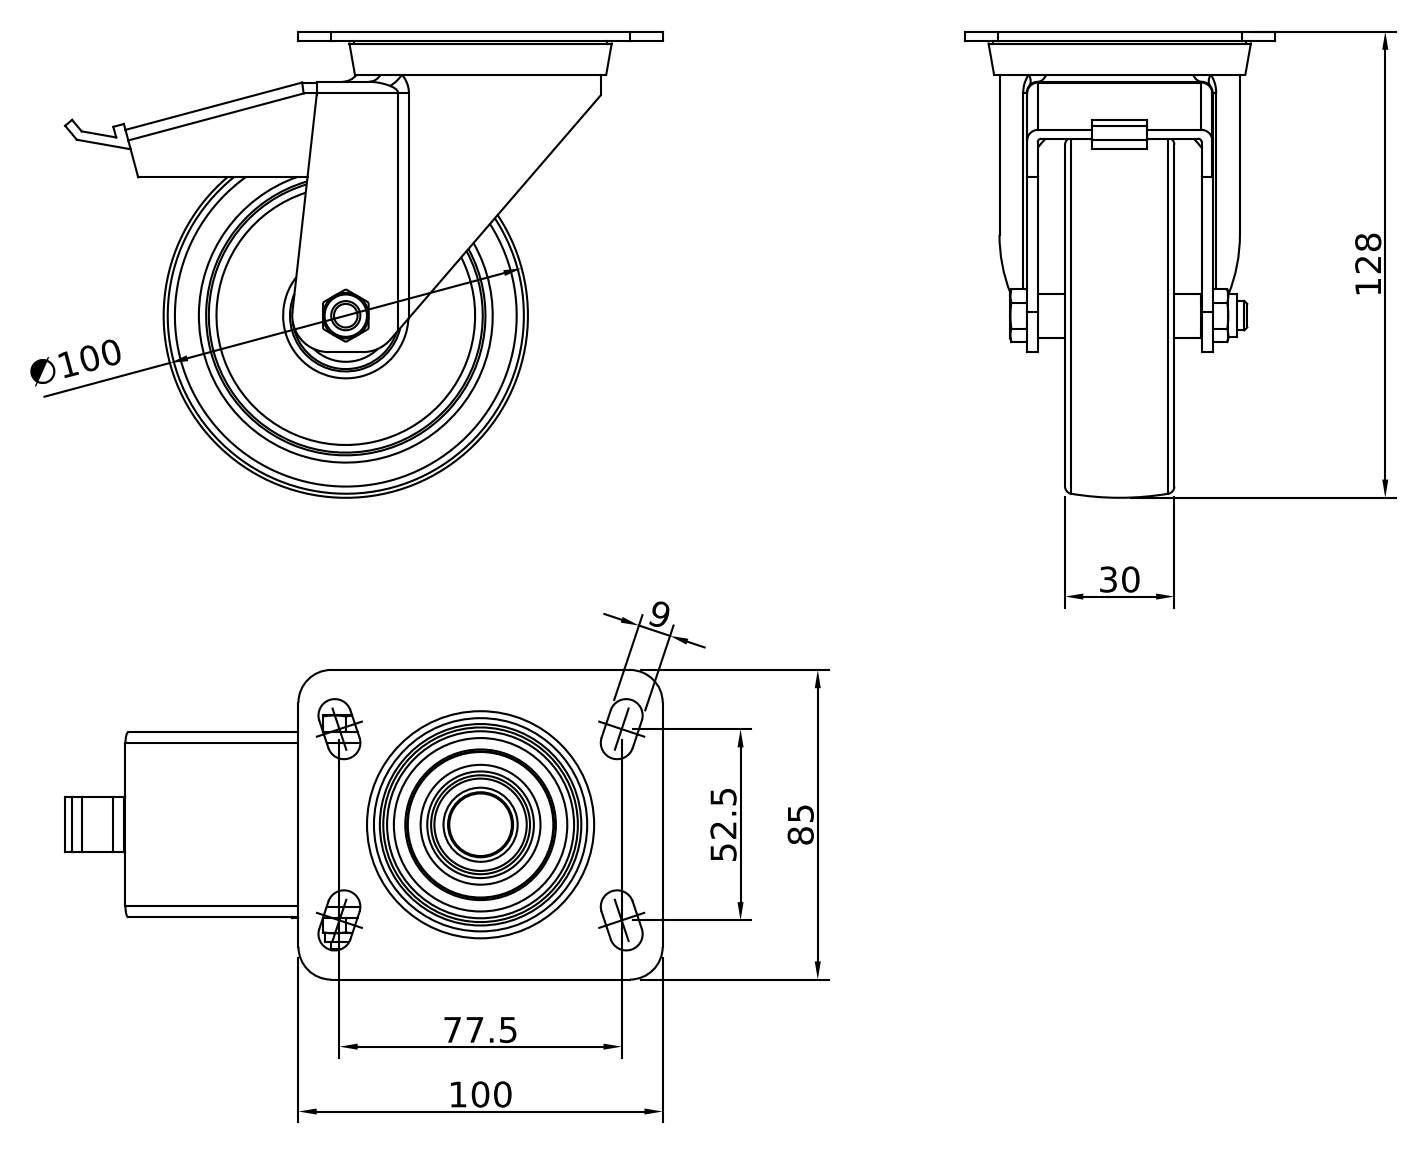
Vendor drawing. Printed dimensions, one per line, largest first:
128
∅100
100
85
77.5
52.5
30
9
